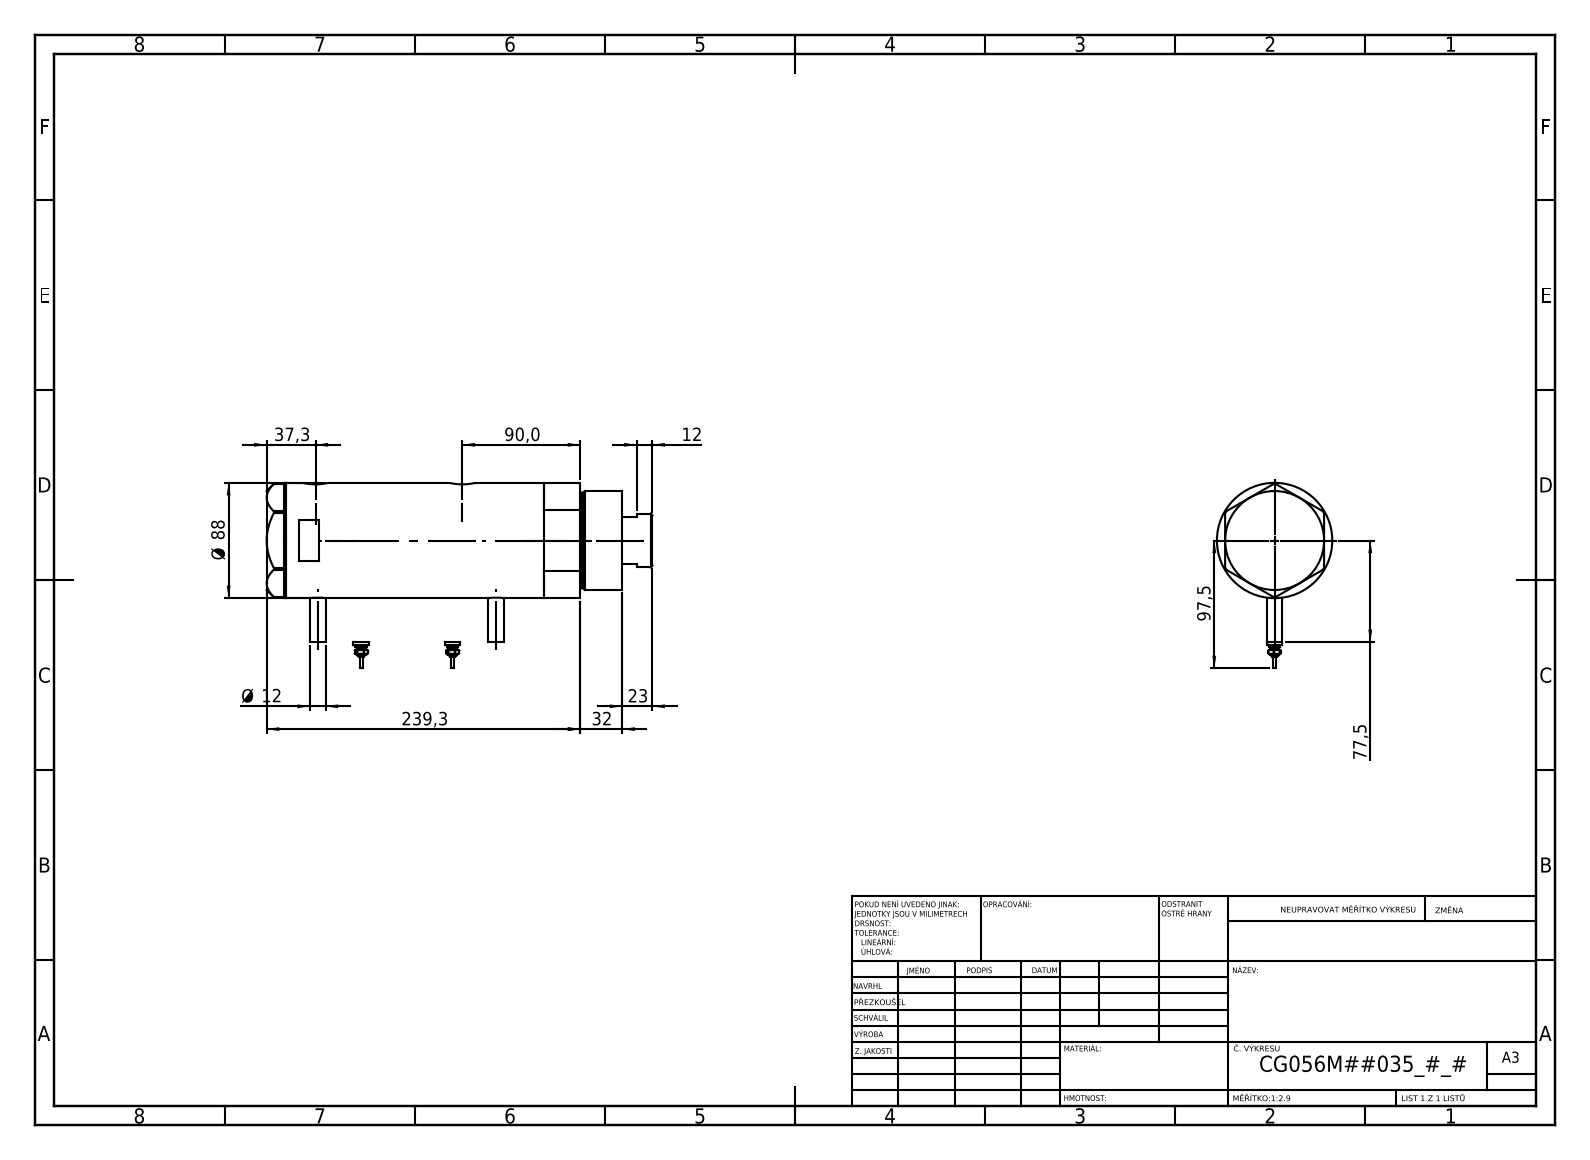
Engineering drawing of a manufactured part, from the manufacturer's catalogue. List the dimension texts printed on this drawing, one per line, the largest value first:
239,3
97,5
90,0
Ø 88
77,5
37,3
32
23
12
Ø 12
